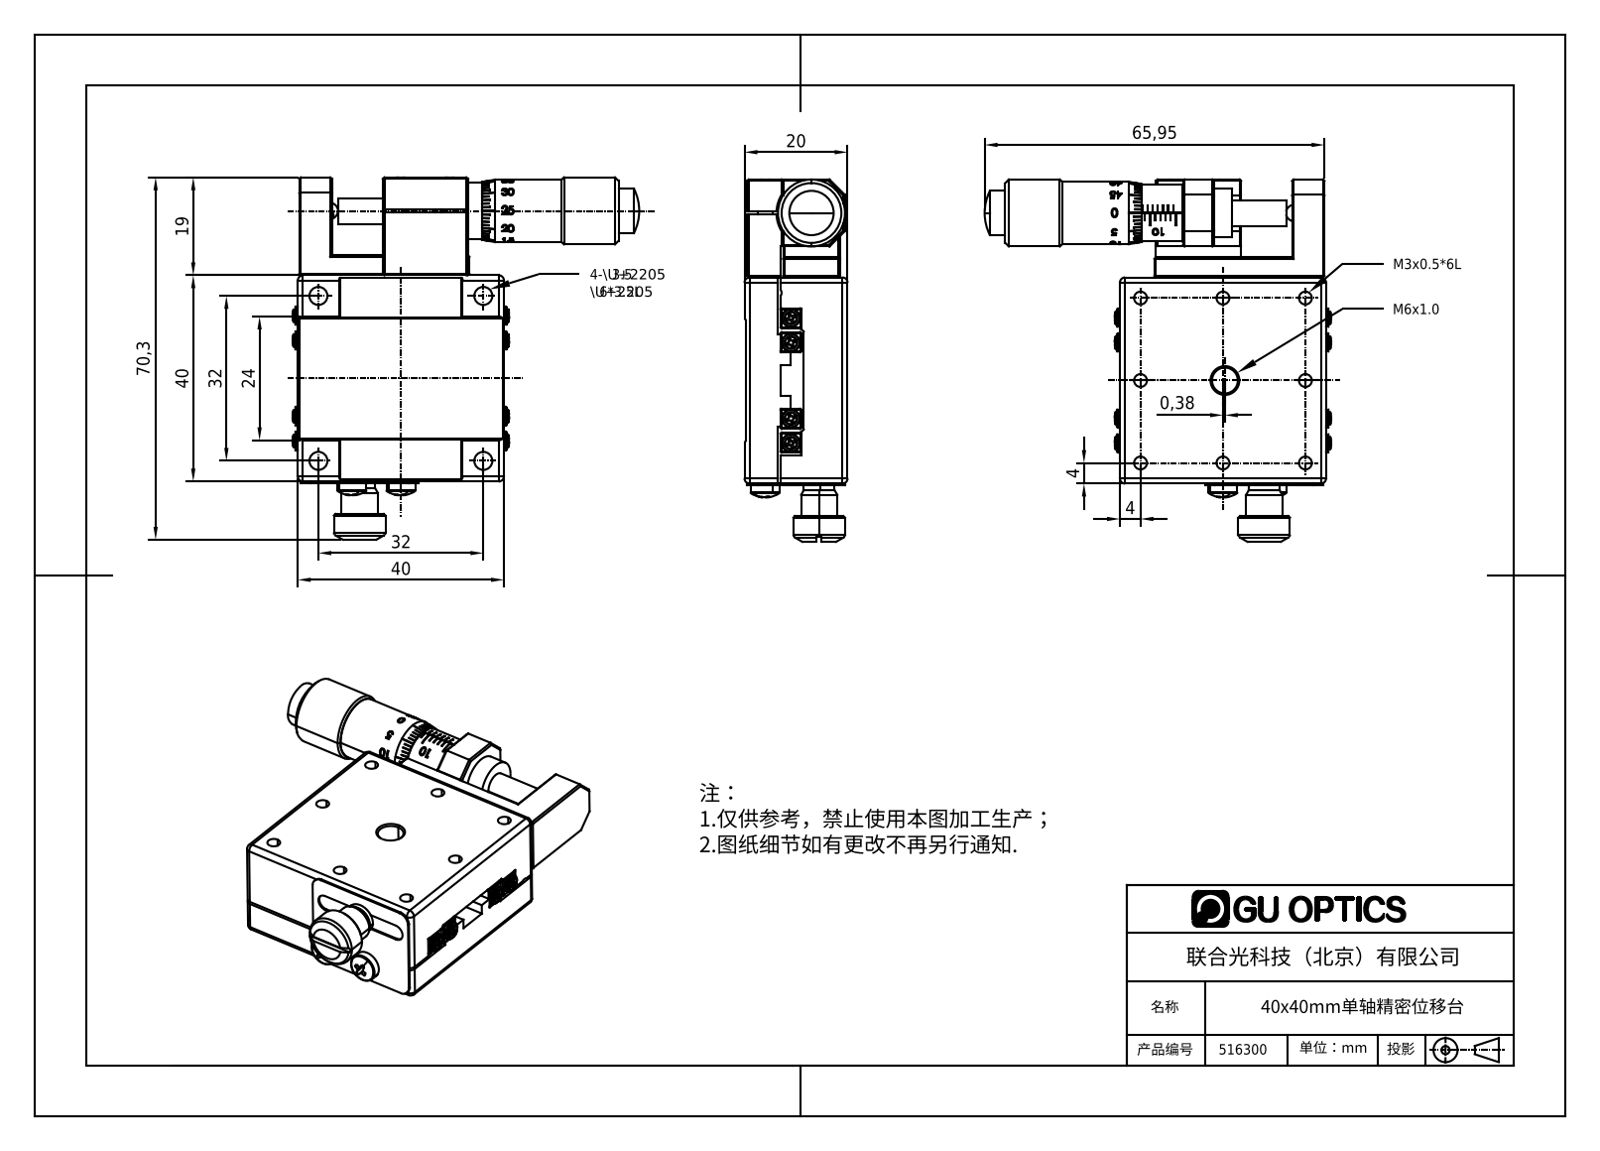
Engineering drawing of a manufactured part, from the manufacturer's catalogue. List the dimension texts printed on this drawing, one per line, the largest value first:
70,3
65,95
40
40
32
32
24
20
19
4
4
0,38
